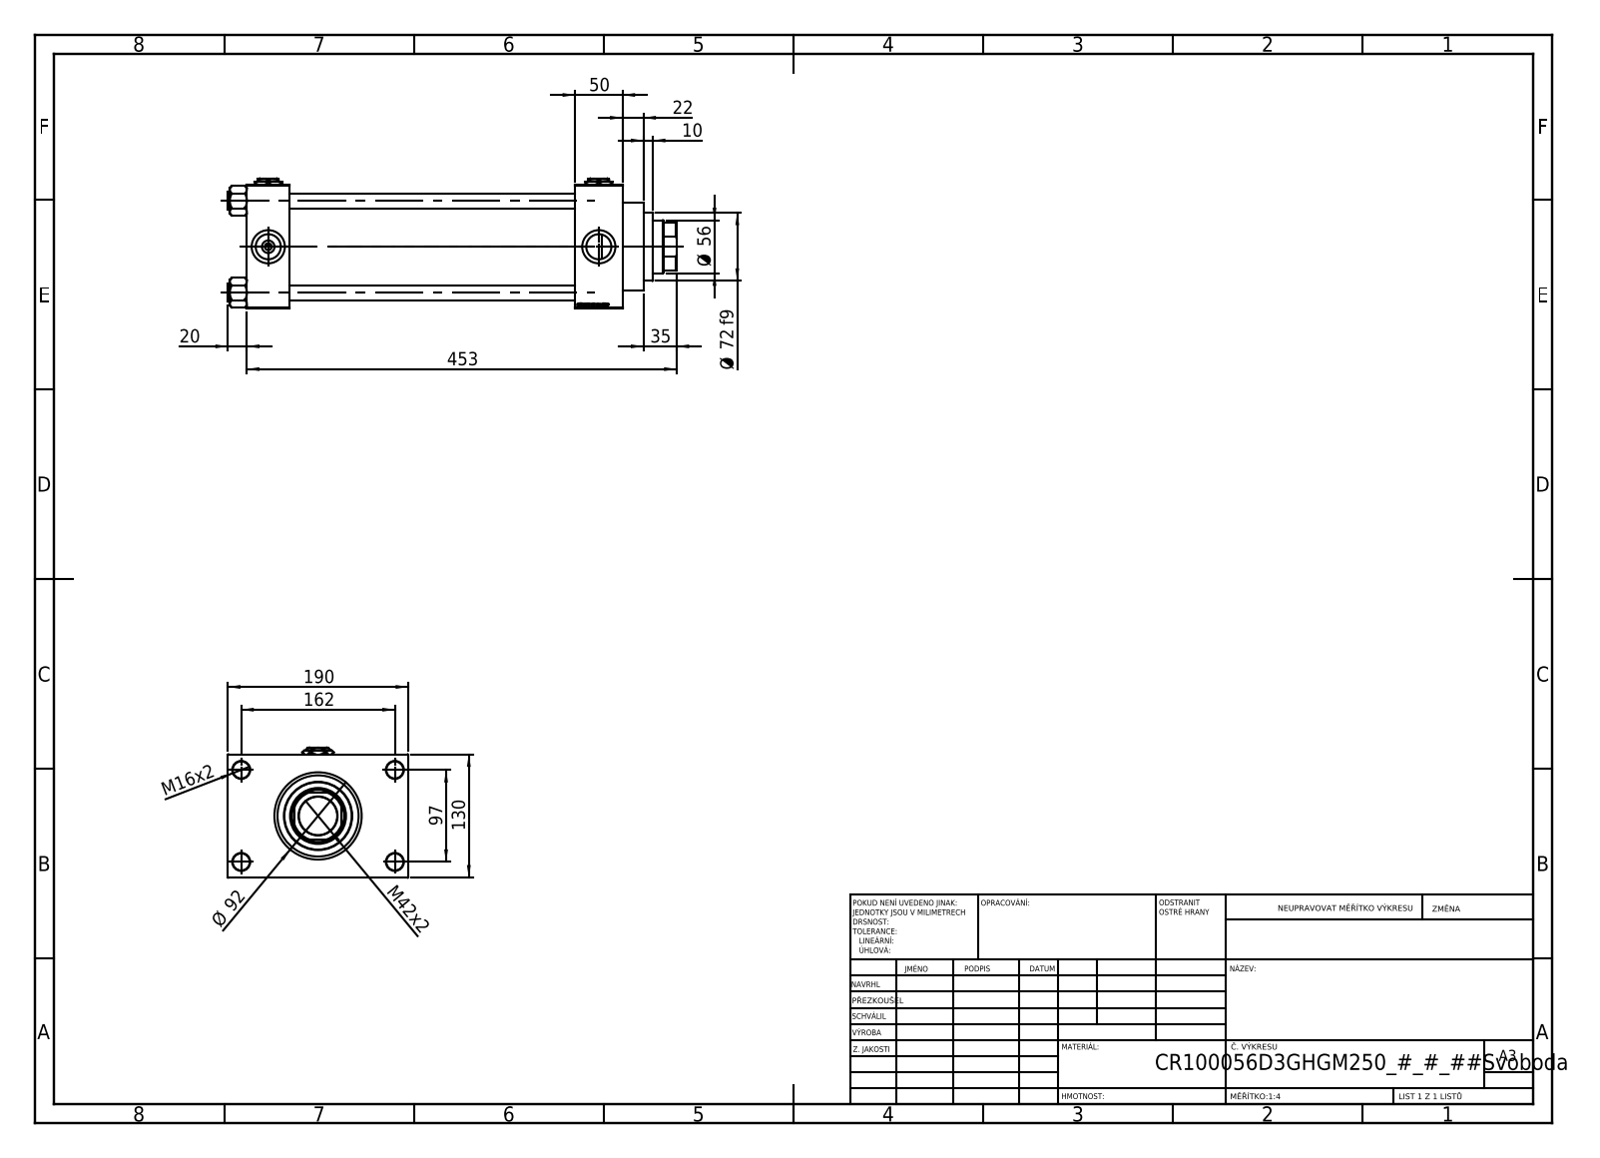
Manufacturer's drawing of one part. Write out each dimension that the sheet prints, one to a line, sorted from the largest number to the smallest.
453
190
162
130
97
Ø 92
Ø 72 f9
Ø 56
50
M42x2
35
22
20
M16x2
10
